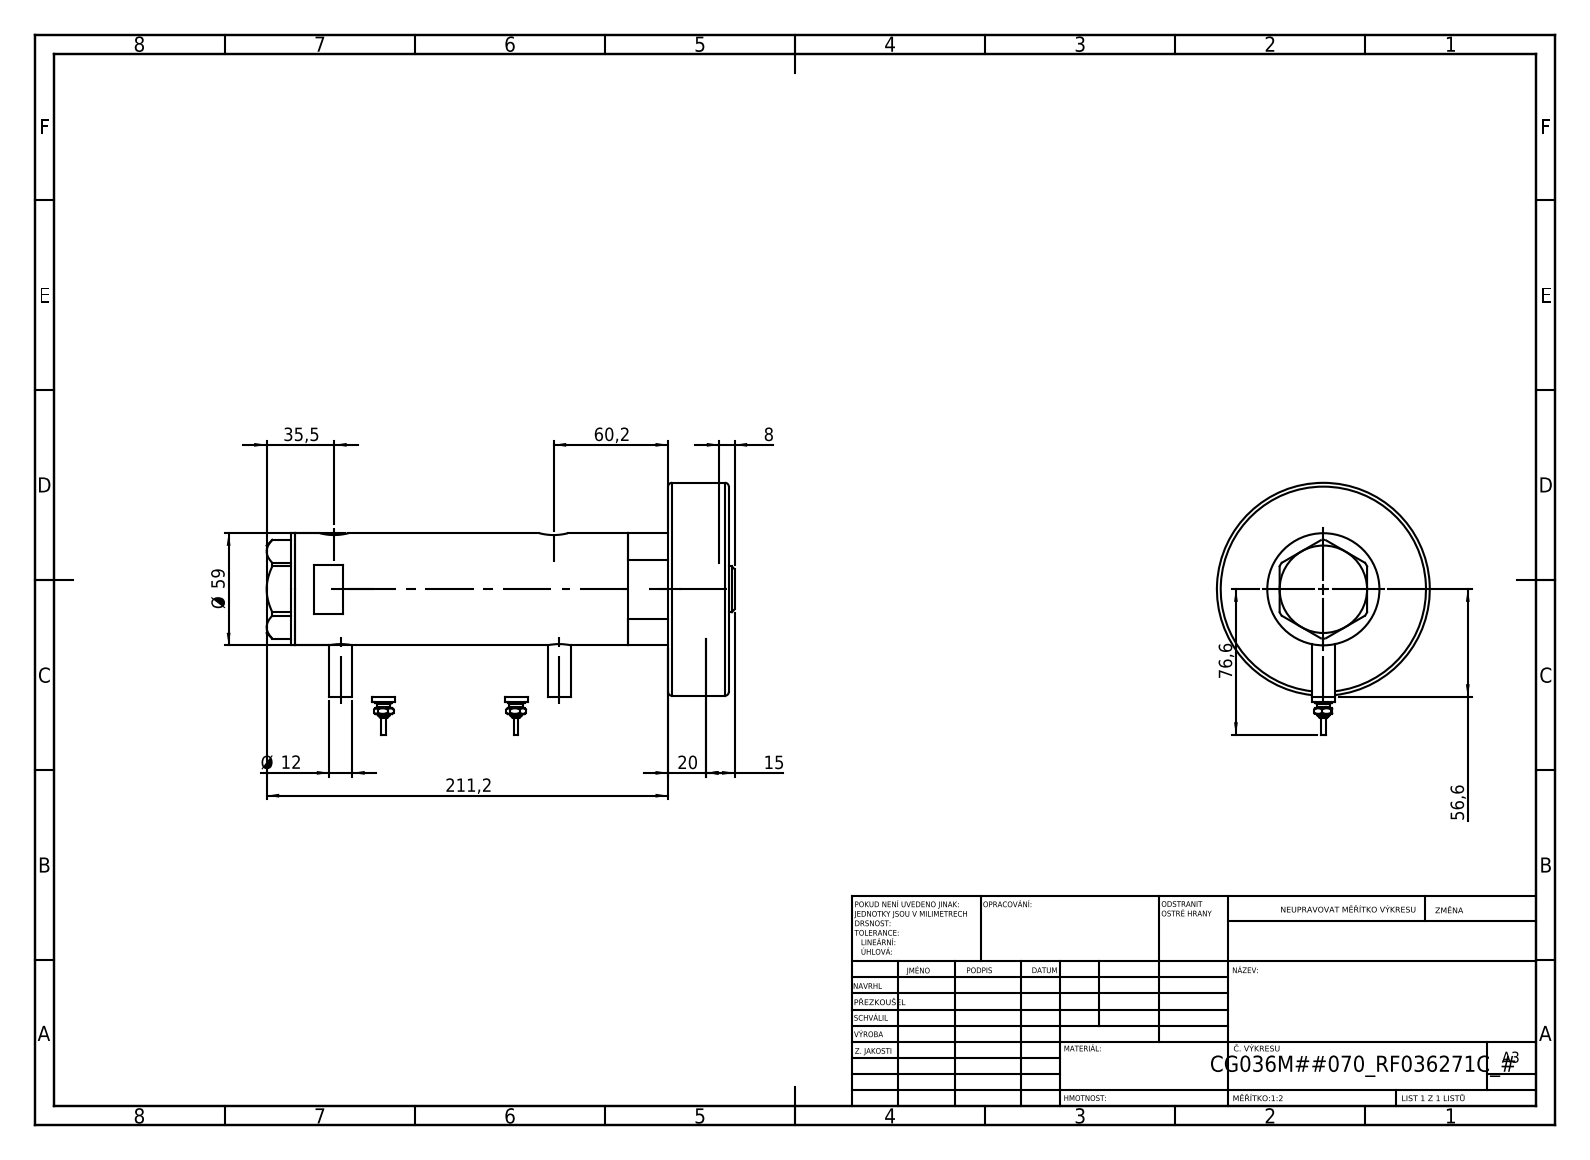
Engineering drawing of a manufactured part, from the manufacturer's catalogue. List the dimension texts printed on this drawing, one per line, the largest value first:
211,2
76,6
60,2
Ø 59
56,6
35,5
20
15
Ø 12
8
